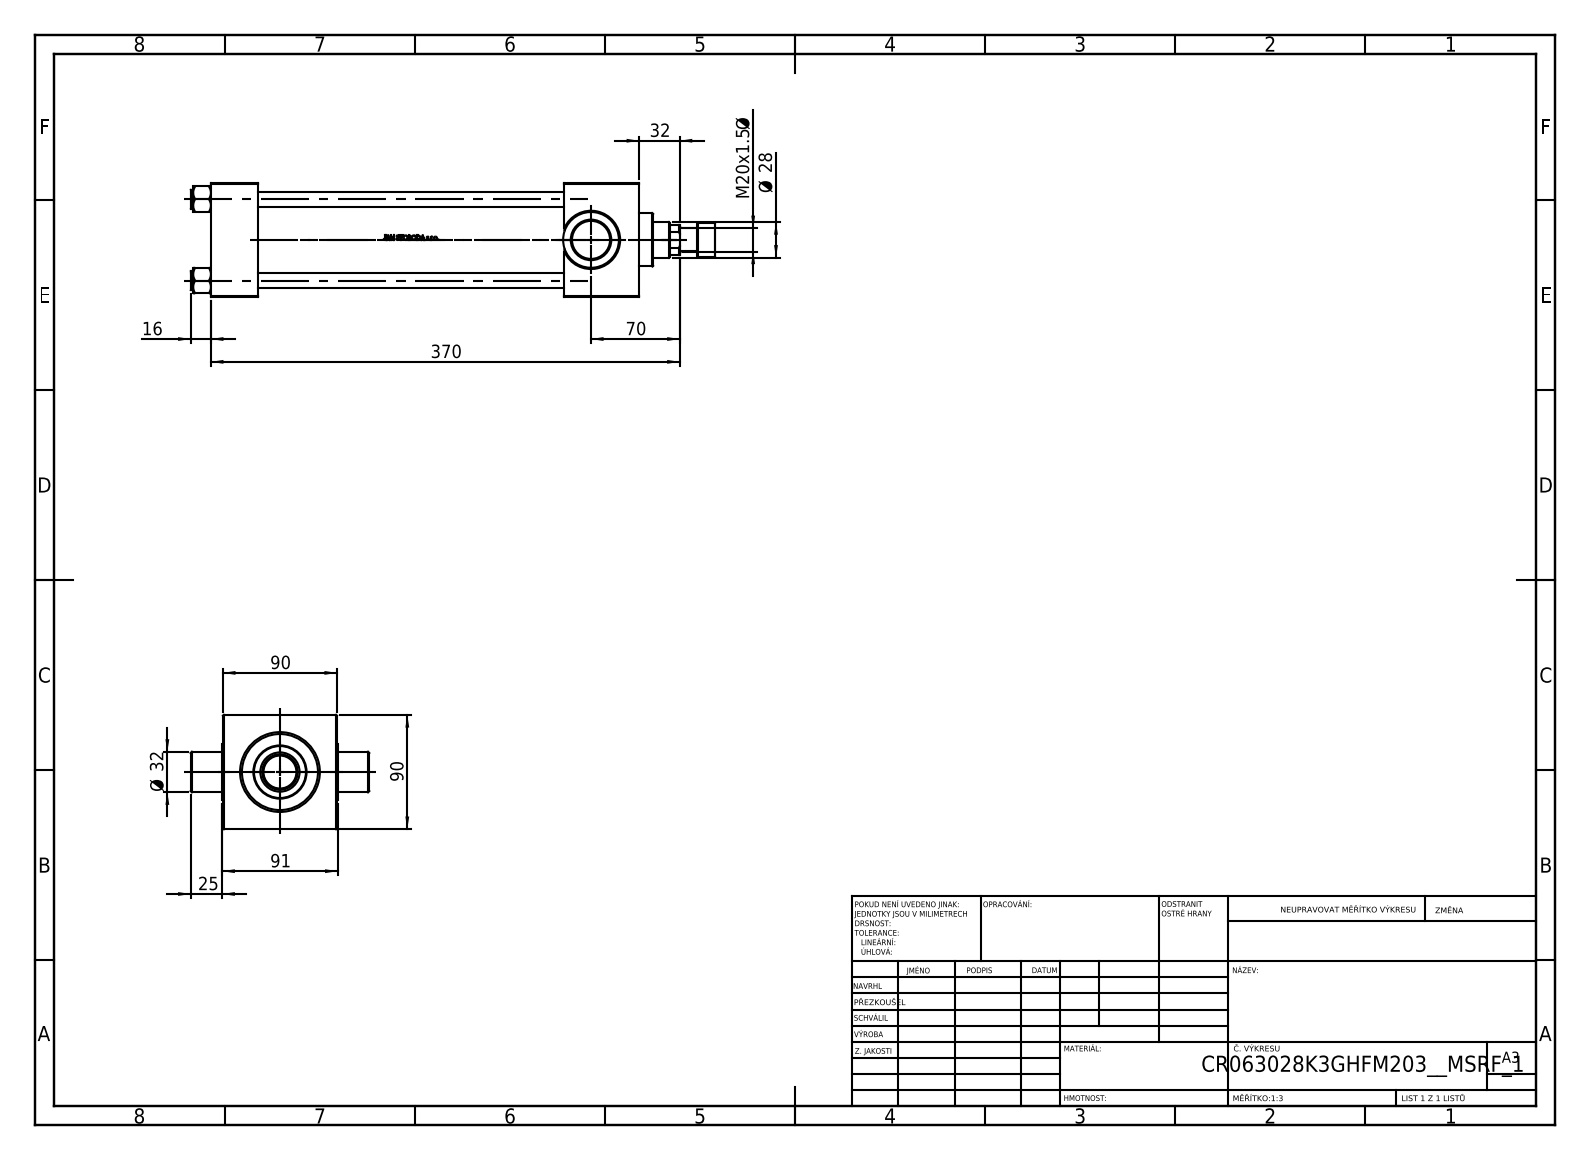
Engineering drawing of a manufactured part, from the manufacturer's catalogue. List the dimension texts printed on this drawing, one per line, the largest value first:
370
91
90
90
70
32
Ø 32
Ø 28
25
M20x1.5 Ø
16
